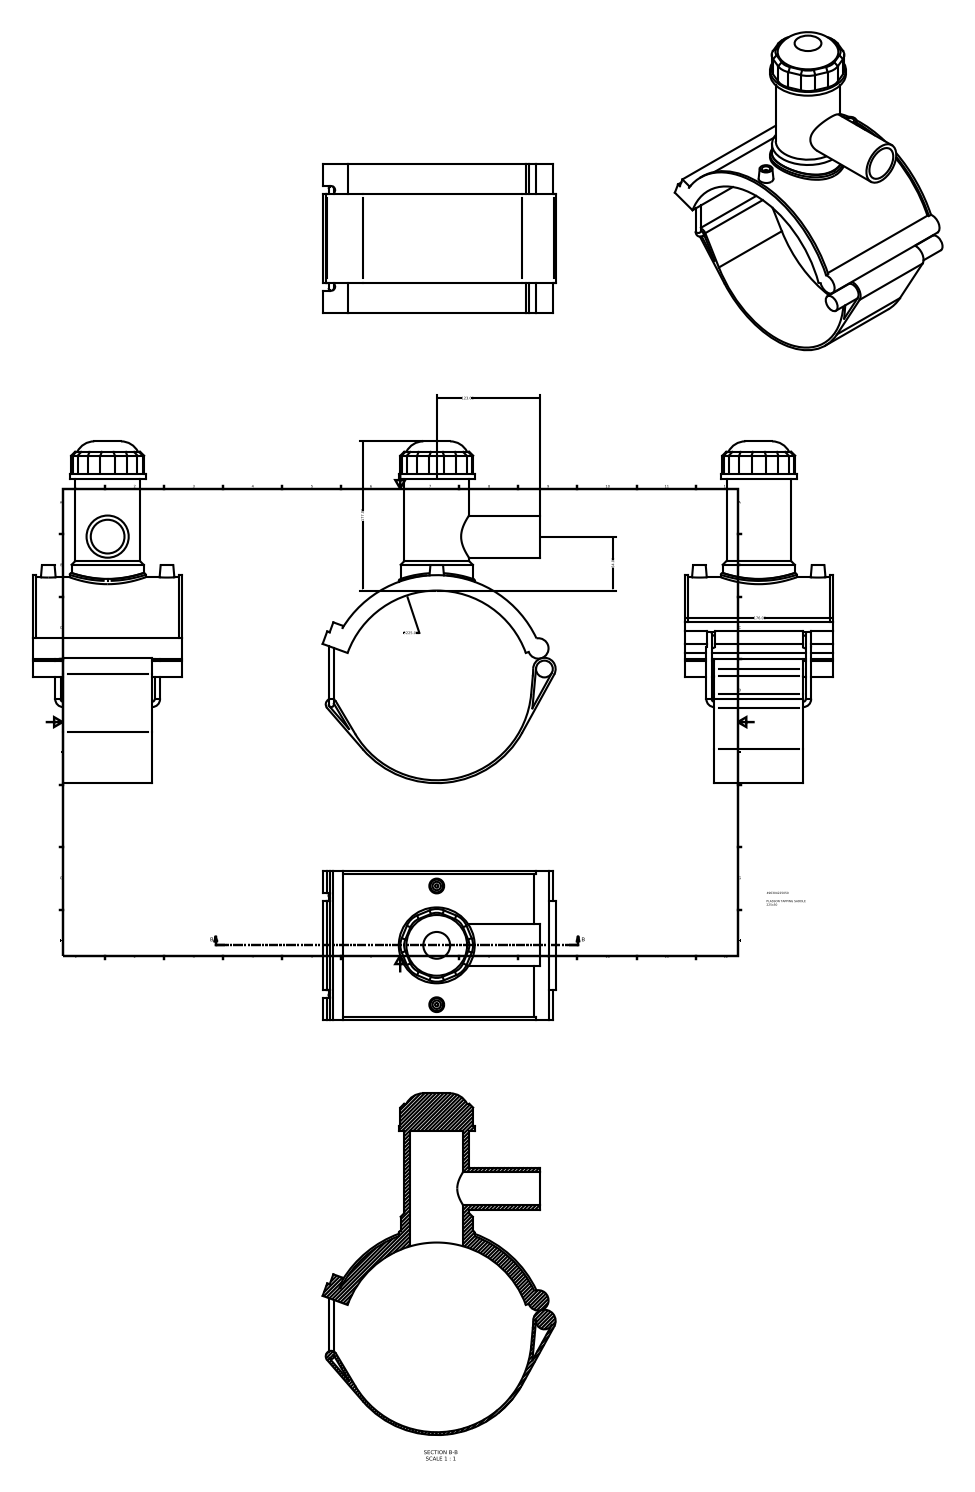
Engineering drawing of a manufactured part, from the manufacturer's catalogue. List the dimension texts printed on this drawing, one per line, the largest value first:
∅225.00
177.00
176.00
123.00
64.00
